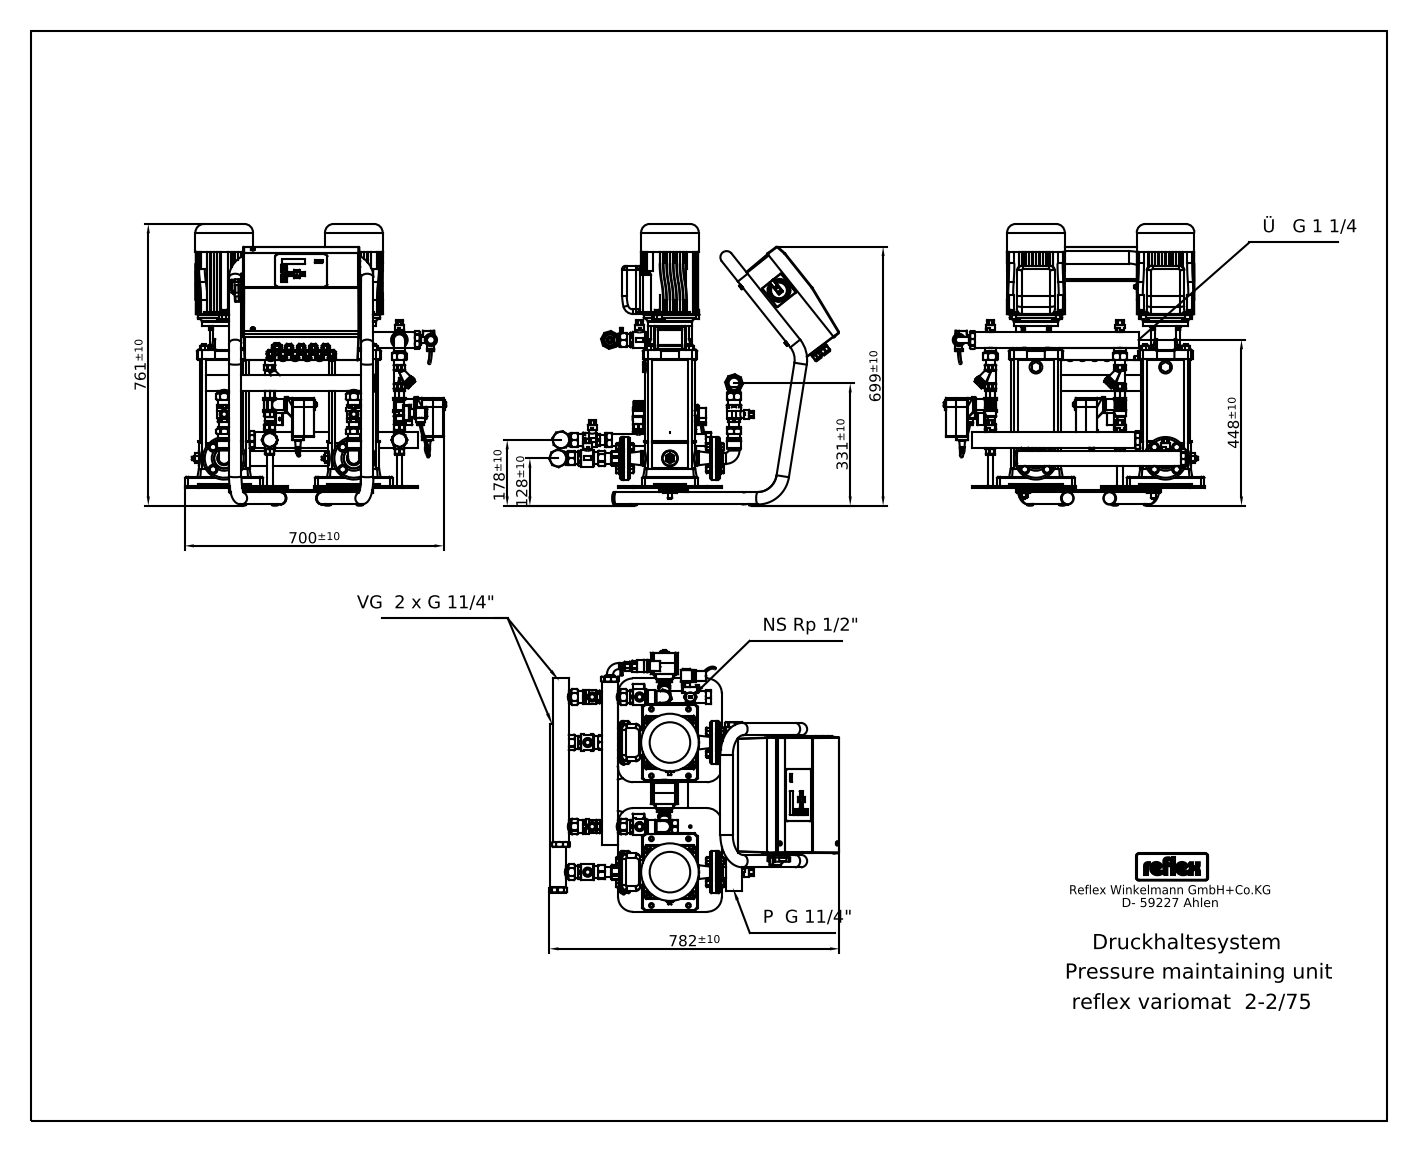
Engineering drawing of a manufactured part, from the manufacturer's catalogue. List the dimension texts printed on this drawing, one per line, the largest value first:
782±10
761±10
700±10
699±10
448±10
331±10
178±10
128±10
